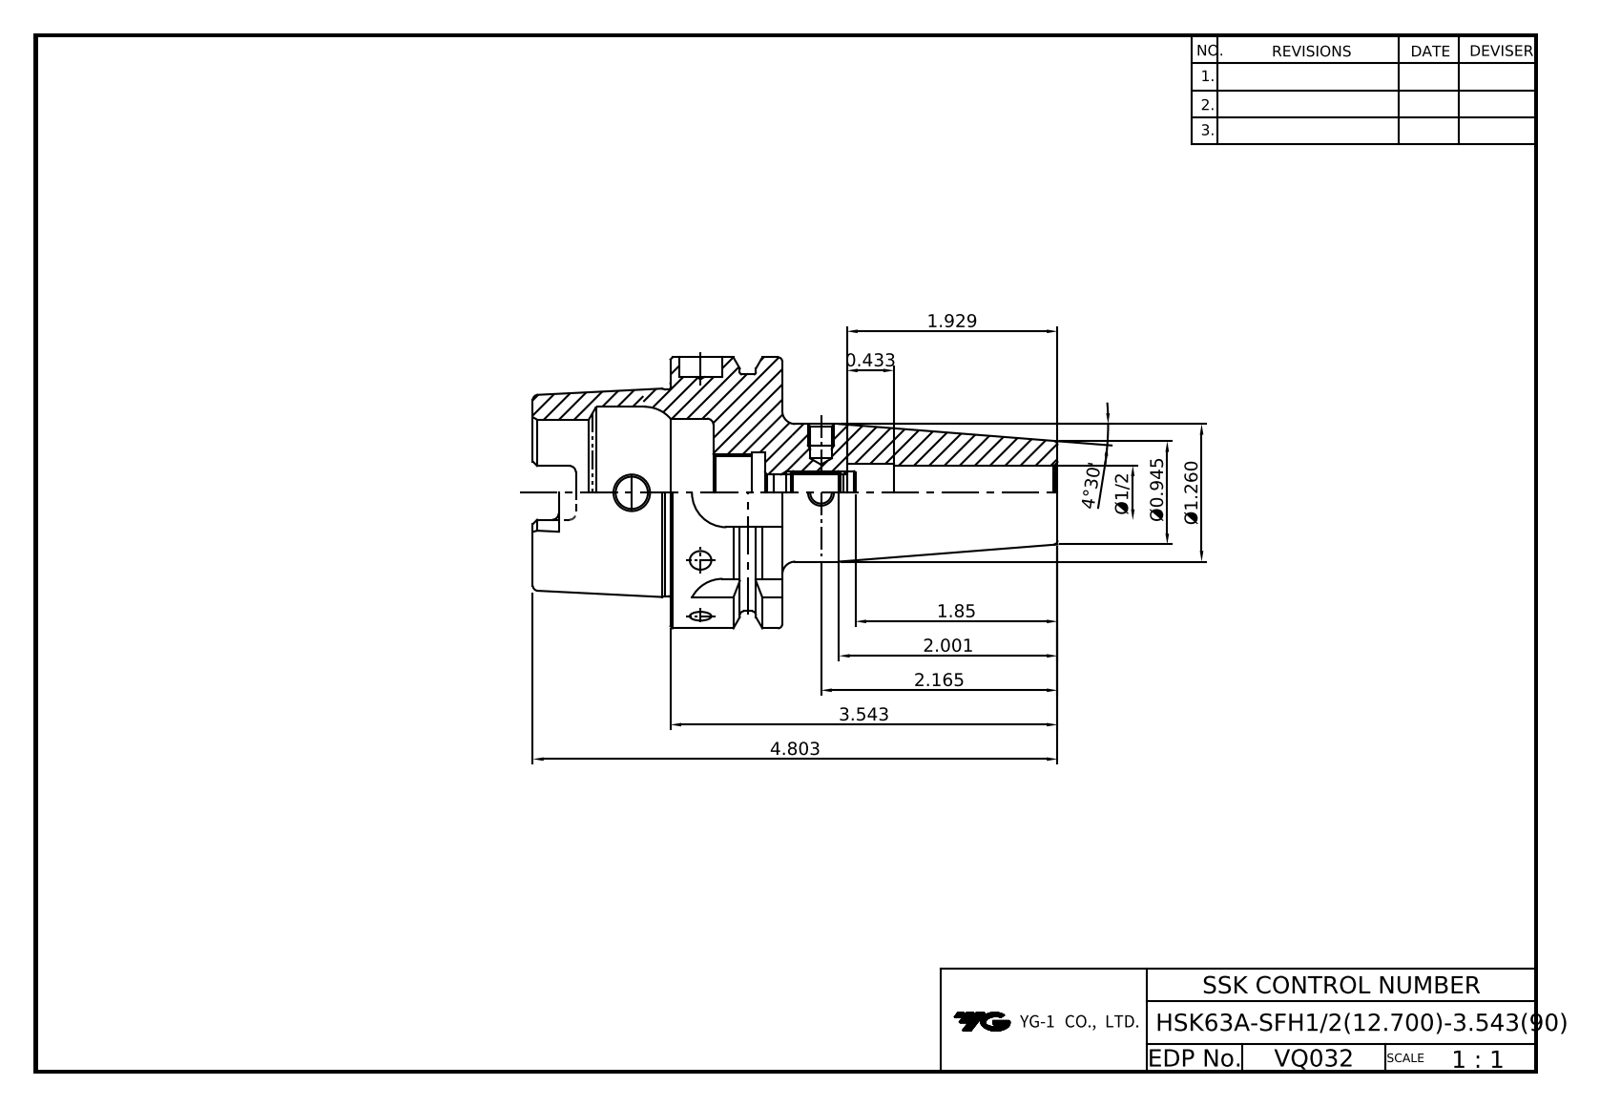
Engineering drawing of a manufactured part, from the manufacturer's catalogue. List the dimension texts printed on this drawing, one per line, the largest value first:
4.803
4°30'
3.543
2.165
2.001
1.929
1.85
Ø1.260
Ø0.945
0.433
